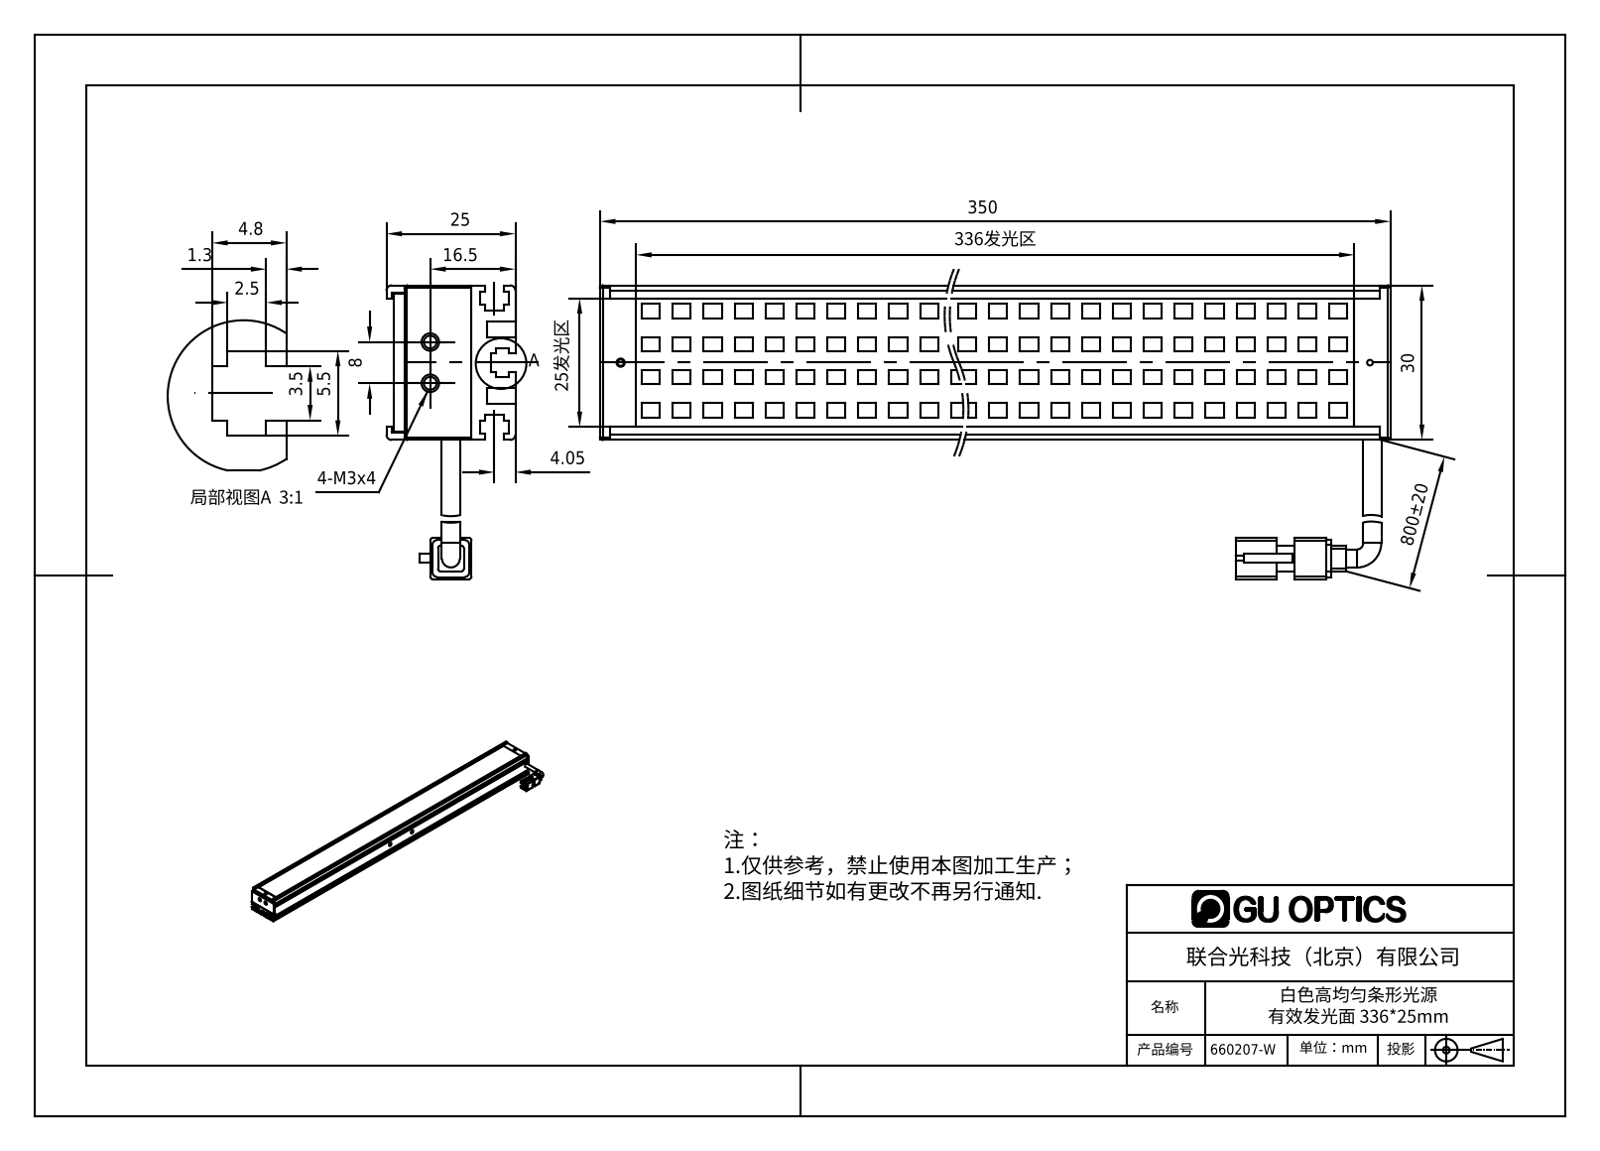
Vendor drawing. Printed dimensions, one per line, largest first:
800±20
350
336发光区
30
25发光区
25
16.5
8
5.5
4.8
4.05
3.5
2.5
1.3
